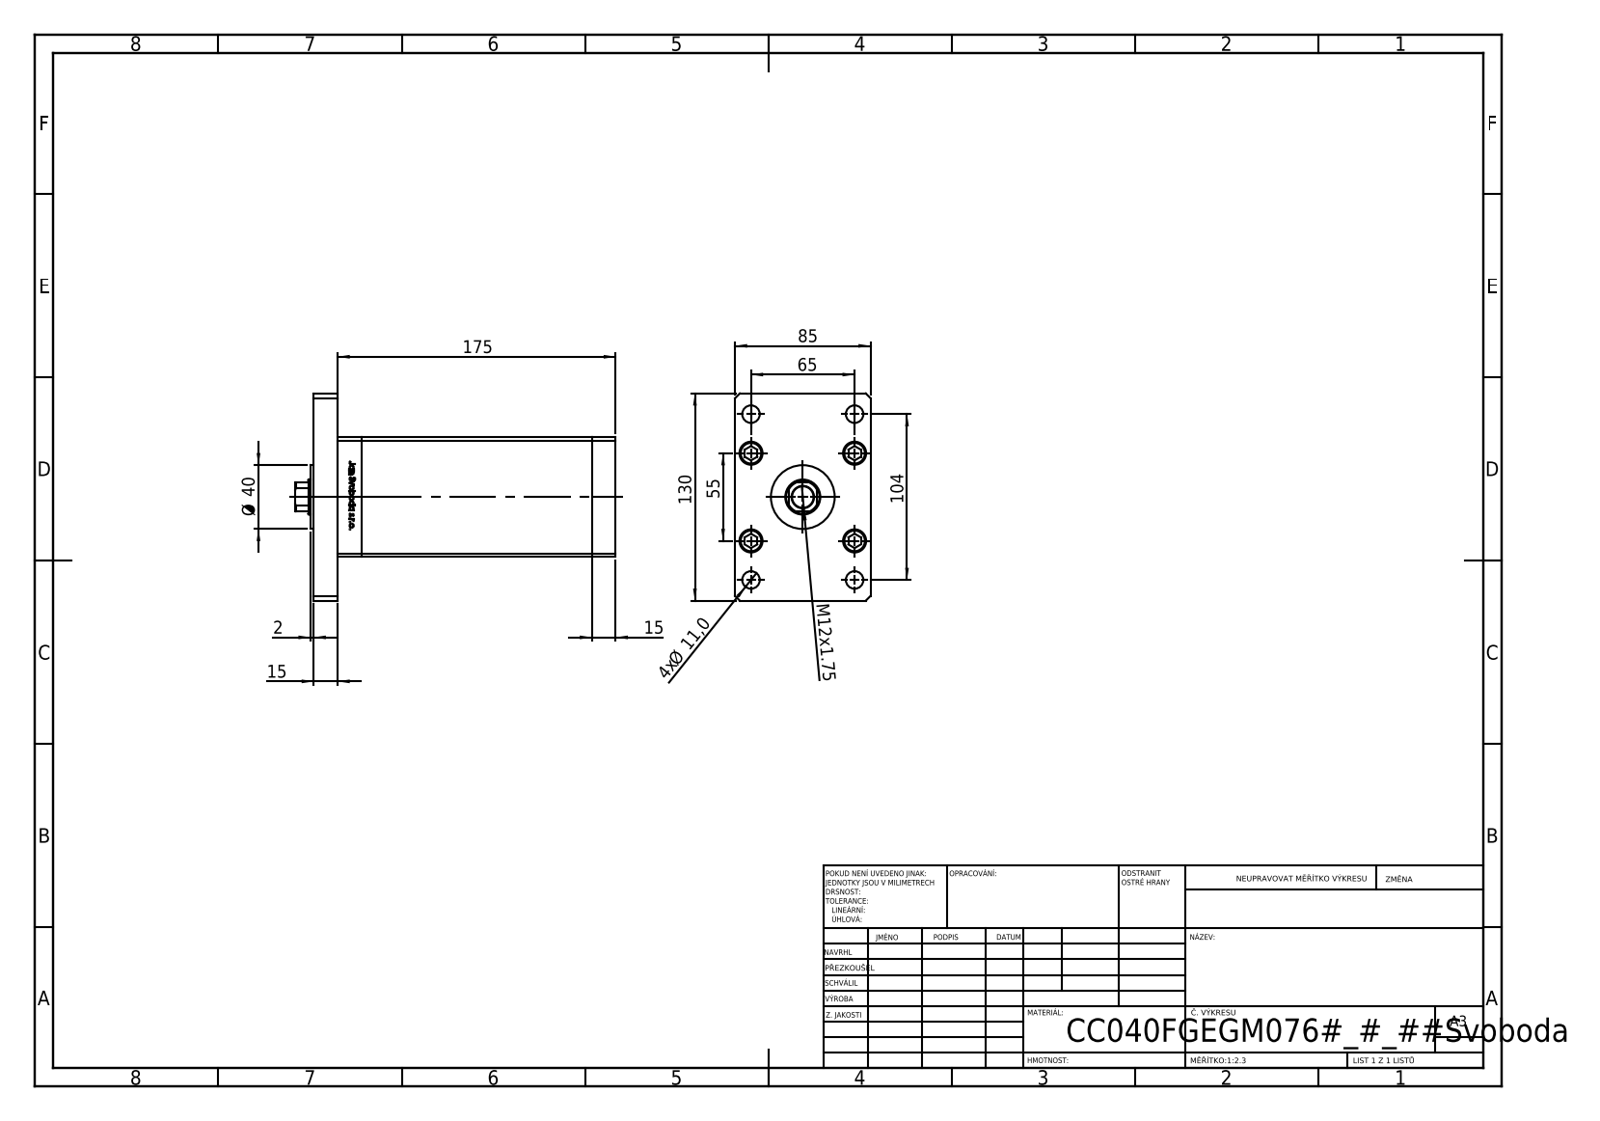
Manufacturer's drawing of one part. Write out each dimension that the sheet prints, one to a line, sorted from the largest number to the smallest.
175
130
104
85
65
55
Ø 40
15
15
M12x1.75
4x Ø 11,0
2
